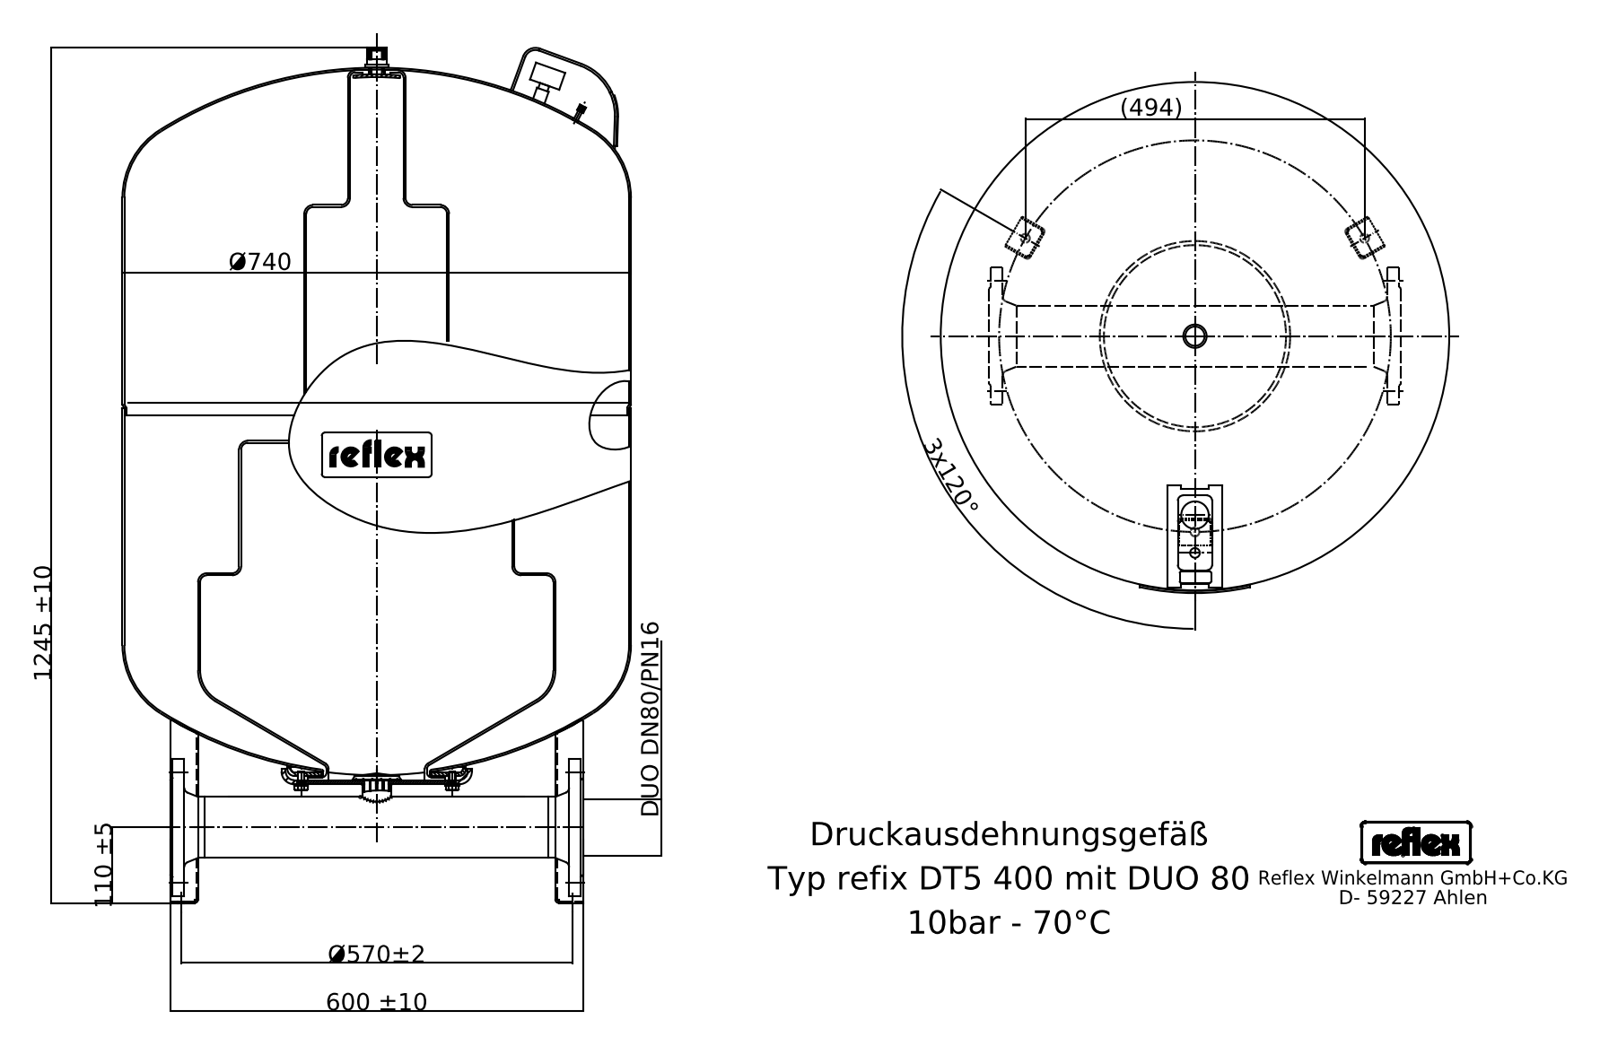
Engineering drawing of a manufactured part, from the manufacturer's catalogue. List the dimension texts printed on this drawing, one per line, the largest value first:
1245 ±10
Ø740
600 ±10
Ø570±2
(494)
3x120°
110 ±5
DUO DN80/PN16
